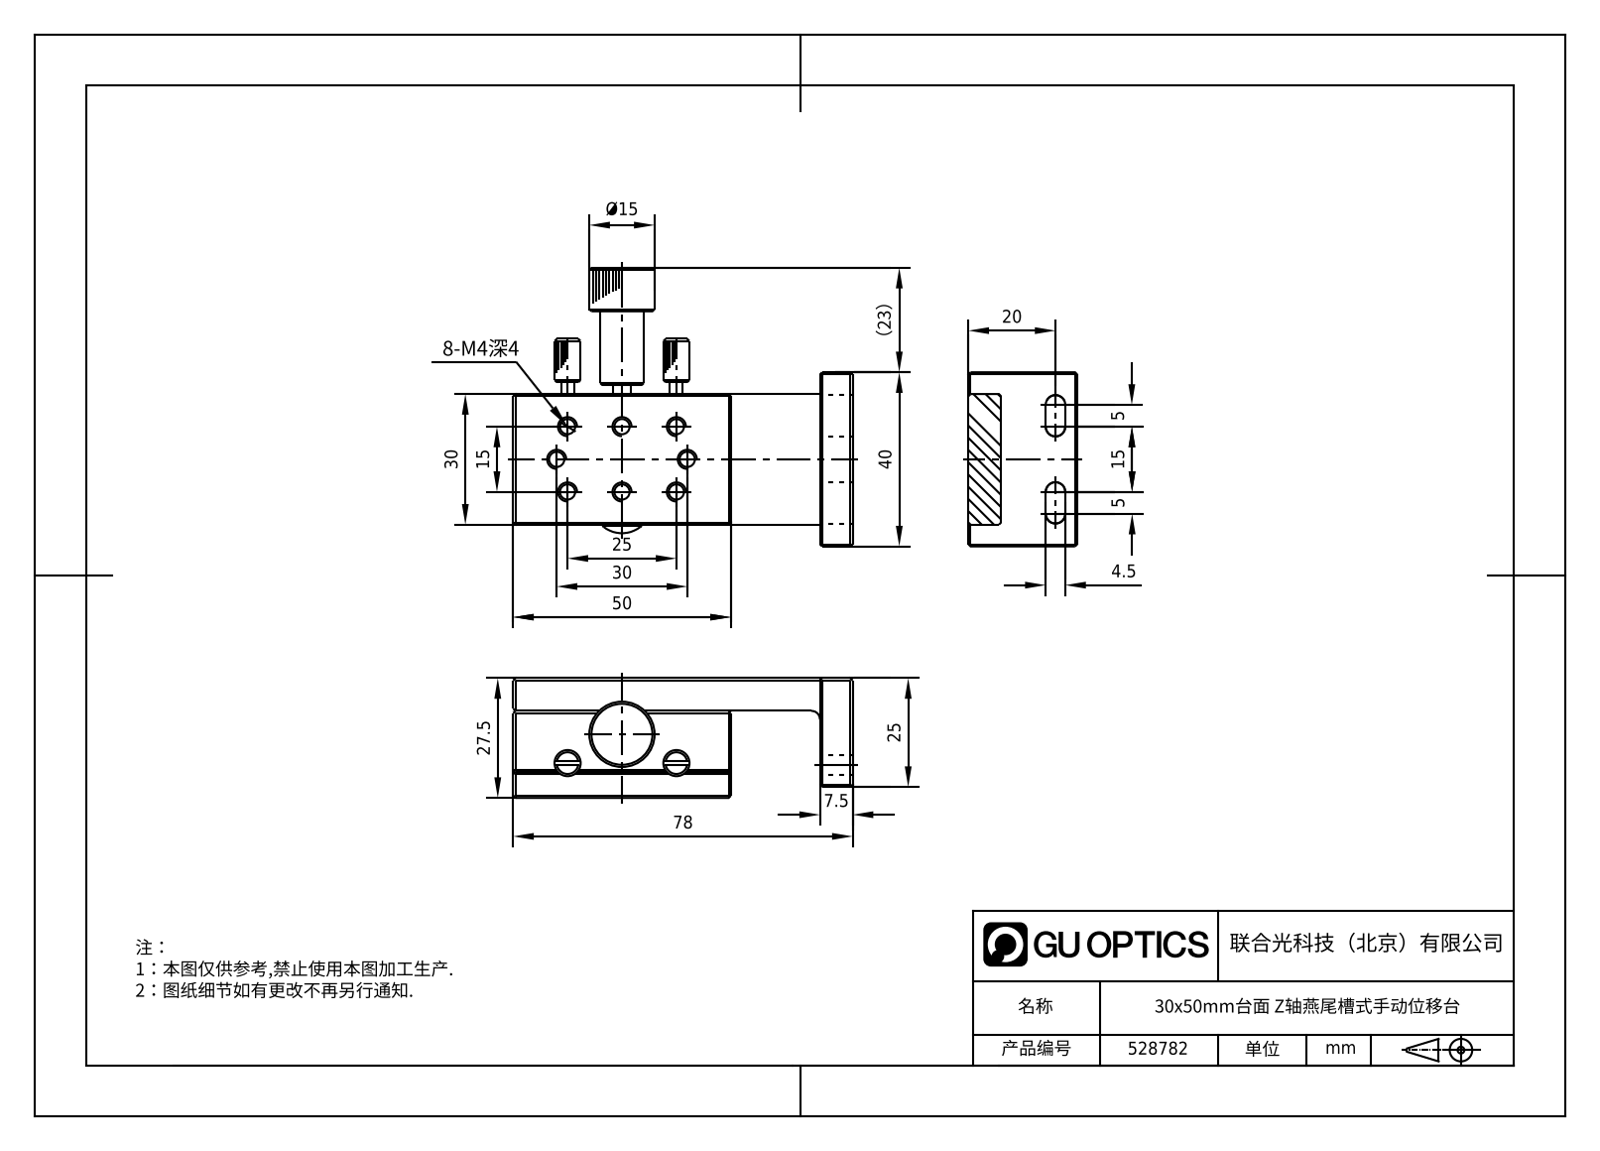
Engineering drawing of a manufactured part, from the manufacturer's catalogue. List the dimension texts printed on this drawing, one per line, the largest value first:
78
50
40
30
30
27.5
25
25
（23）
20
15
15
Ø15
7.5
5
5
4.5
